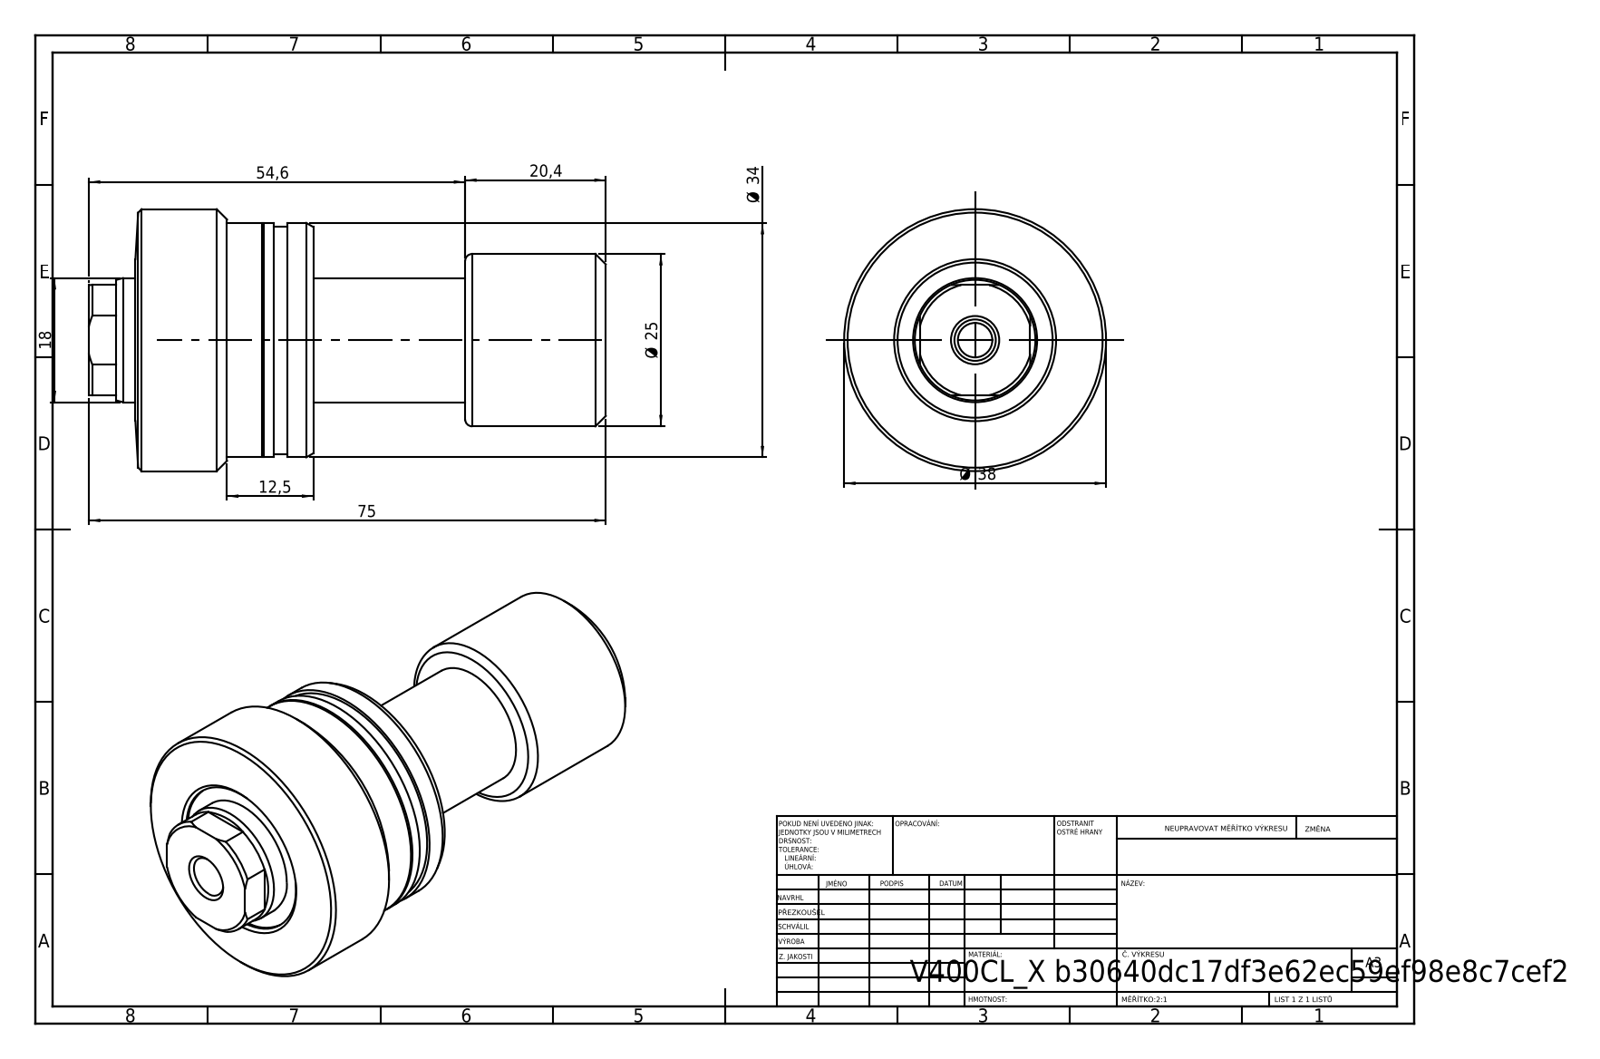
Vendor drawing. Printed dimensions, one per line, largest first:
75
54,6
Ø 38
Ø 34
Ø 25
20,4
18
12,5
